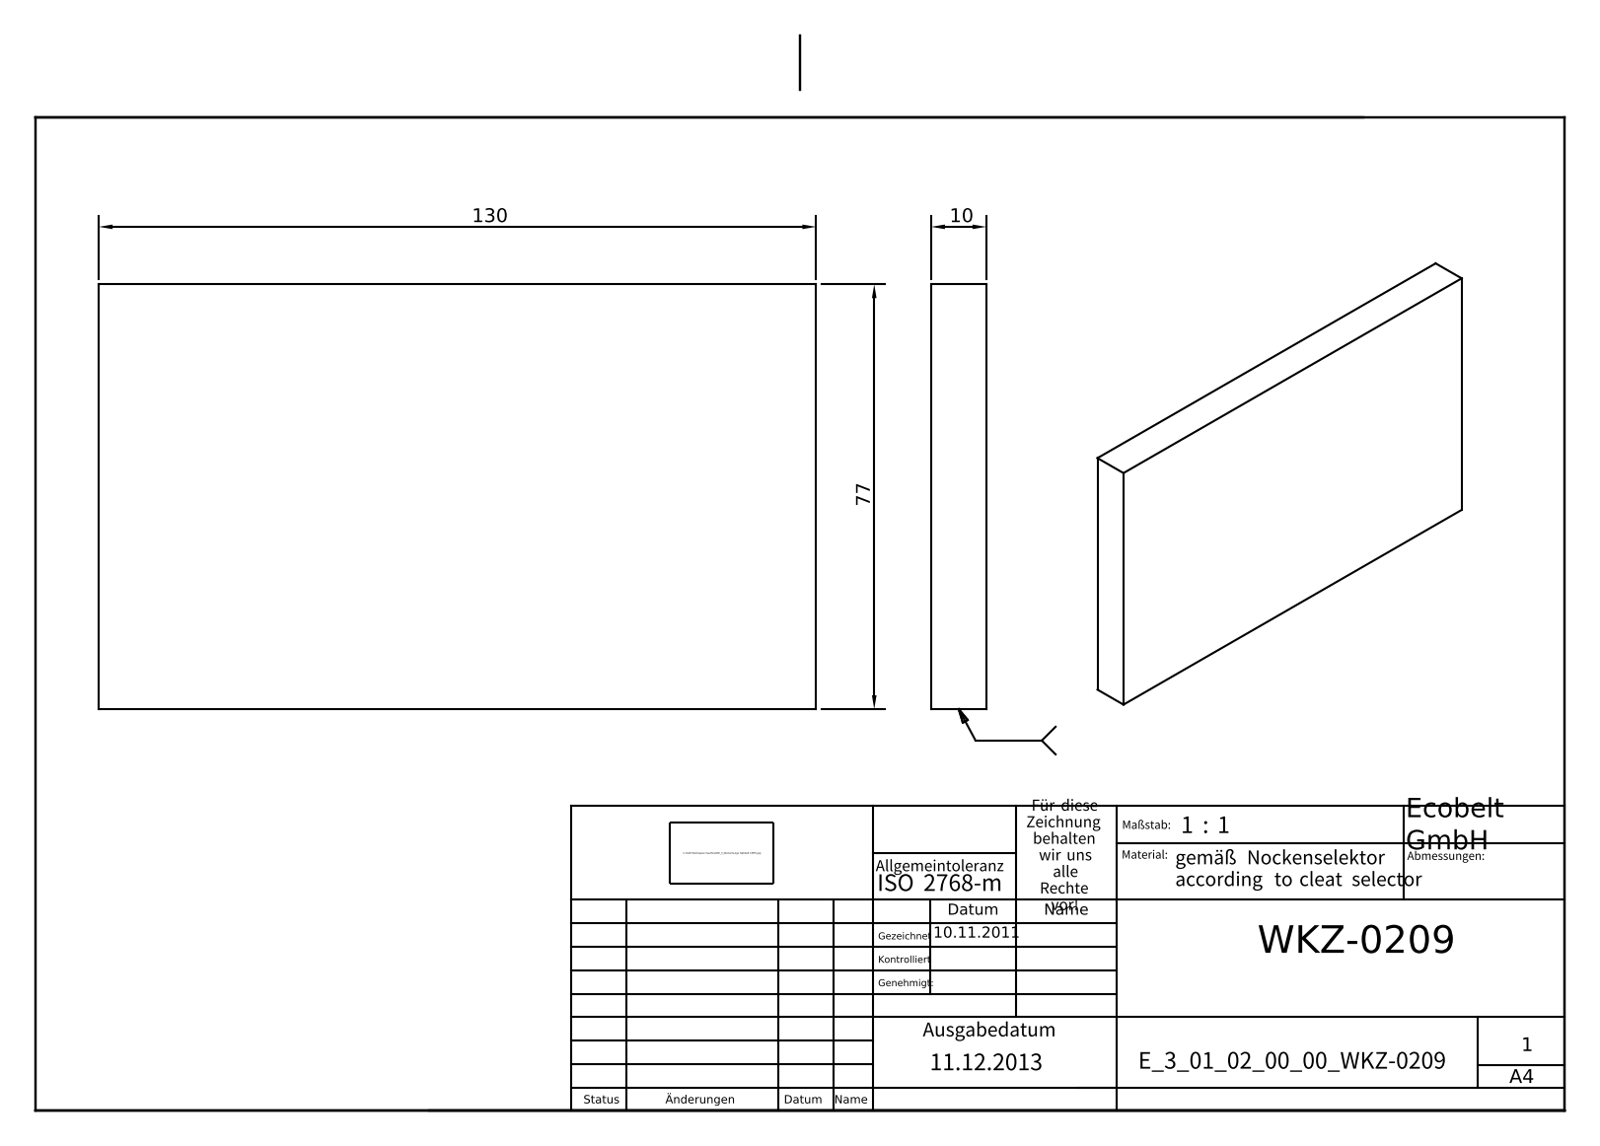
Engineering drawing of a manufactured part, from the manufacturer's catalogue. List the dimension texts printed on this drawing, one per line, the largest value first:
130
77
10
